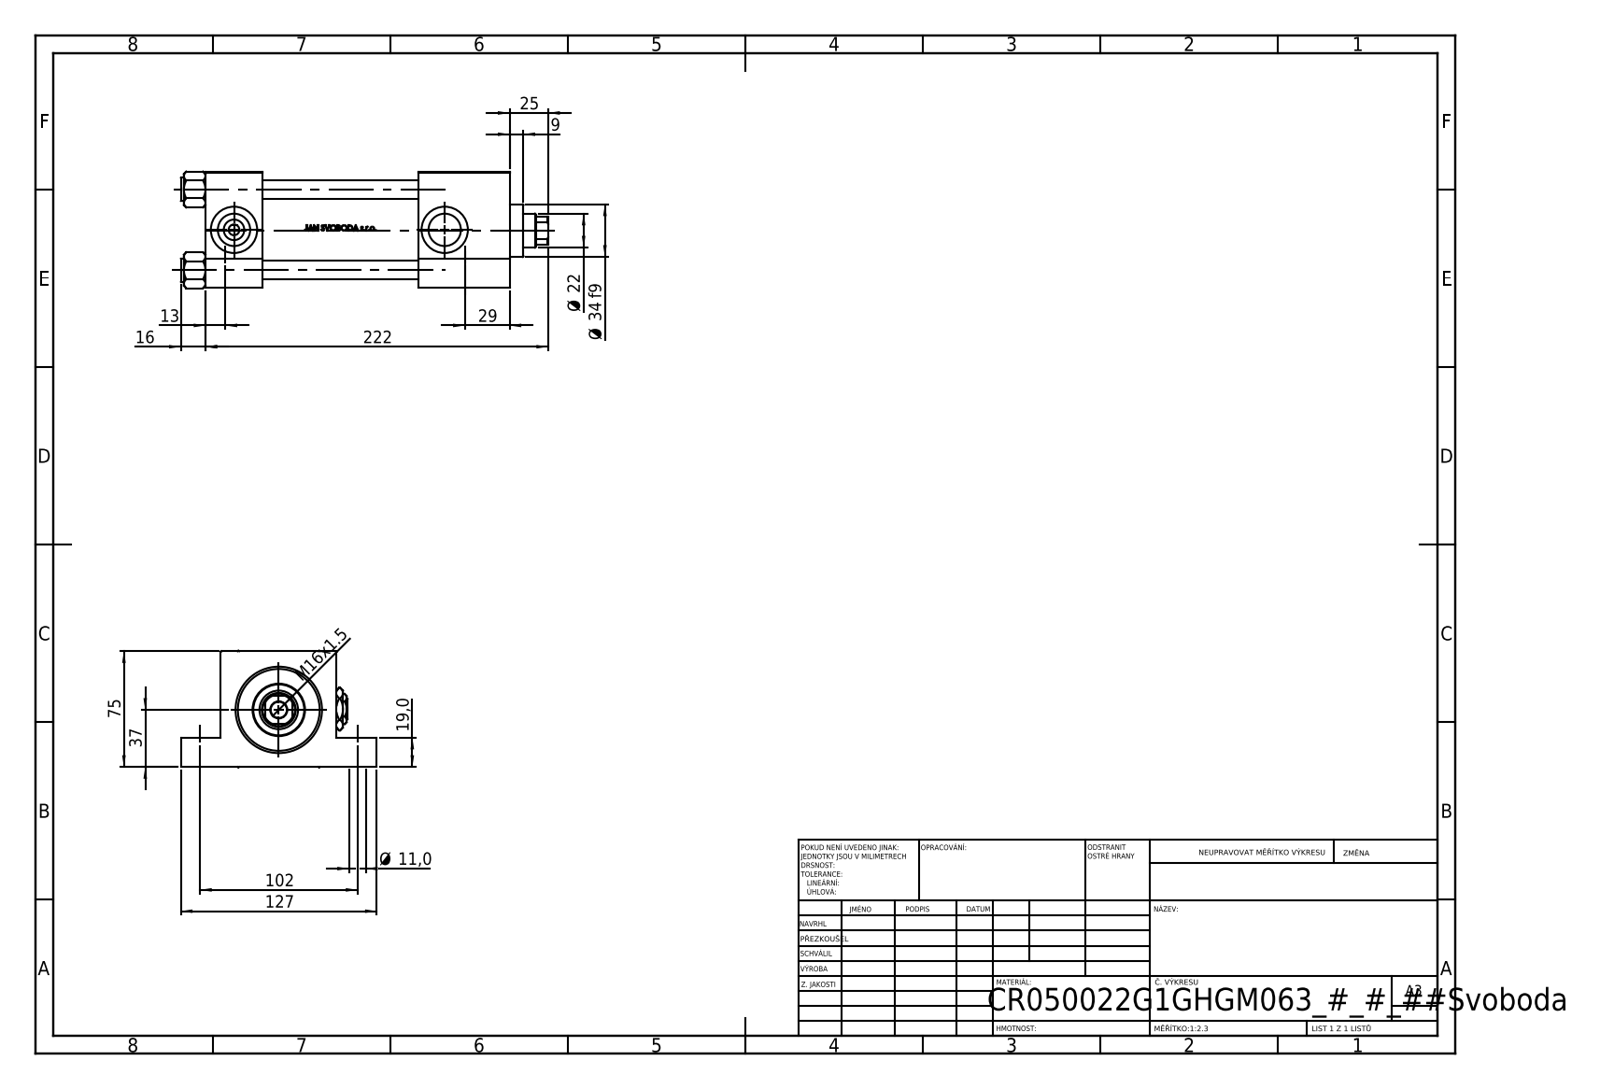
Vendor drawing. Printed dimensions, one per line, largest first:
222
127
102
75
37
Ø 34 f9
29
25
Ø 22
19,0
16
M16x1.5
13
Ø 11,0
9
